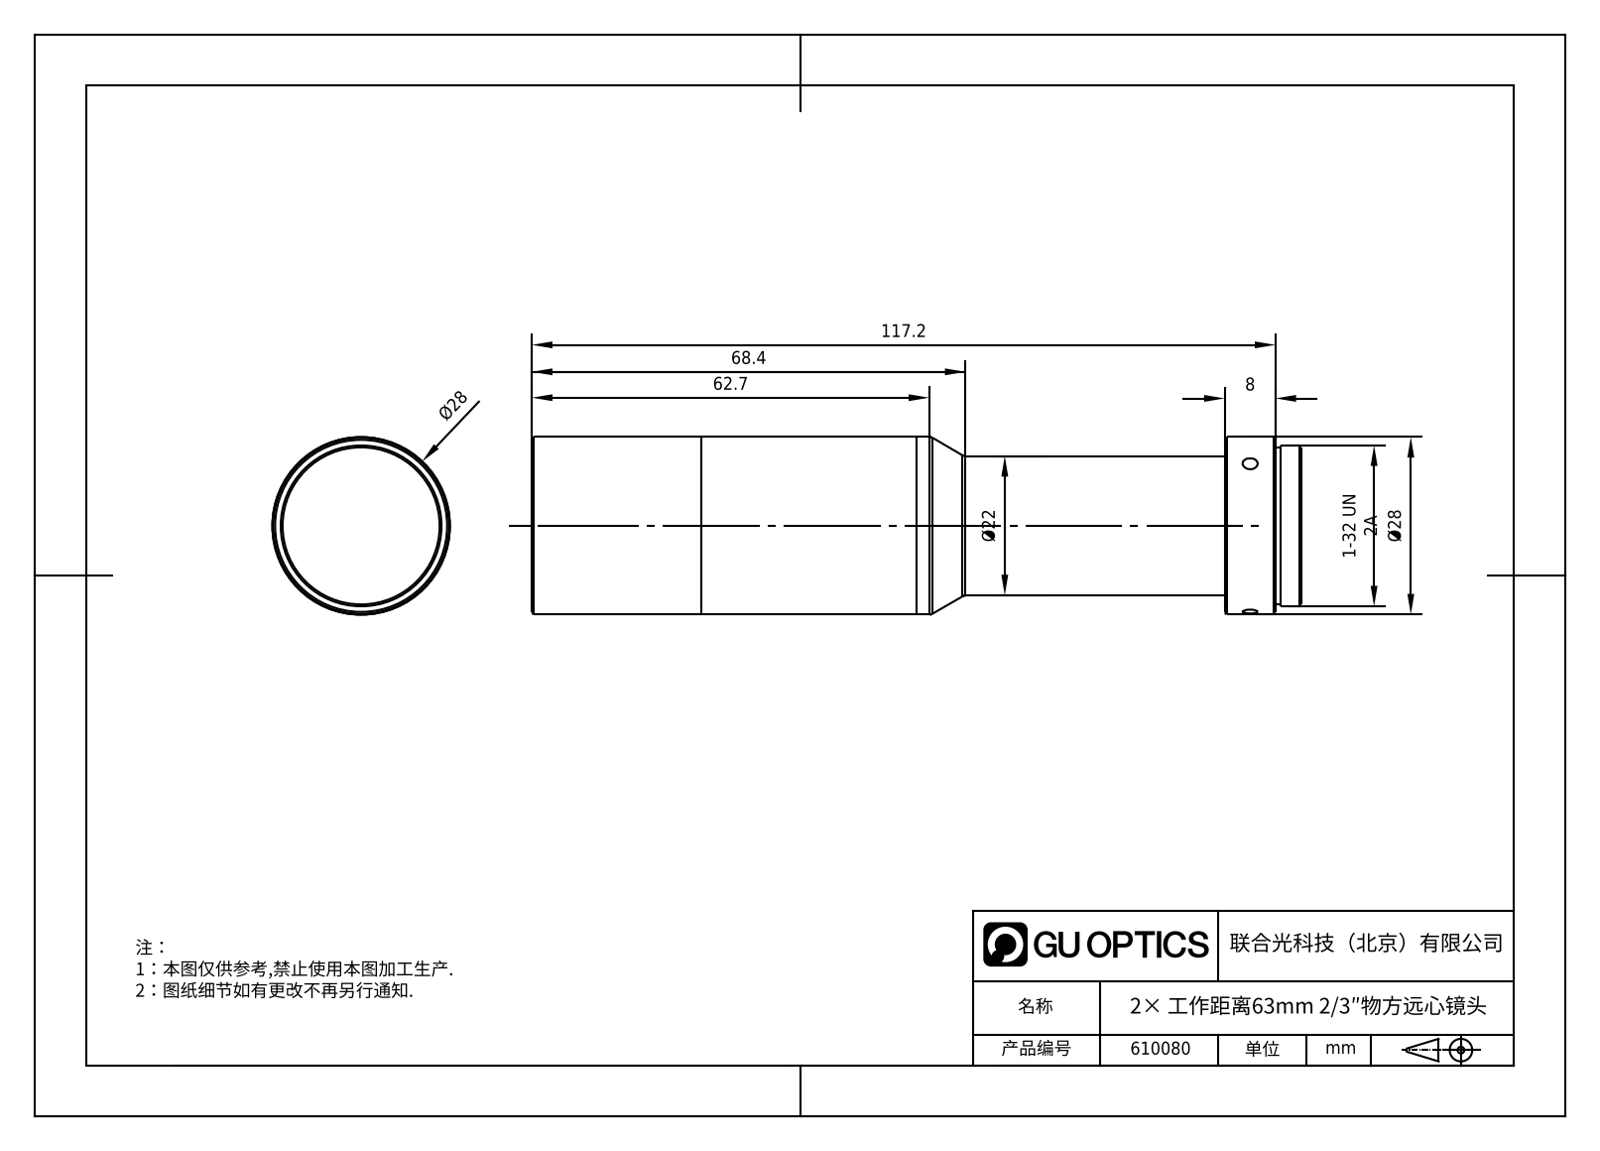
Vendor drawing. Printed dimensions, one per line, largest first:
117.2
68.4
62.7
Ø28
Ø28
Ø22
8
1-32 UN 2A
